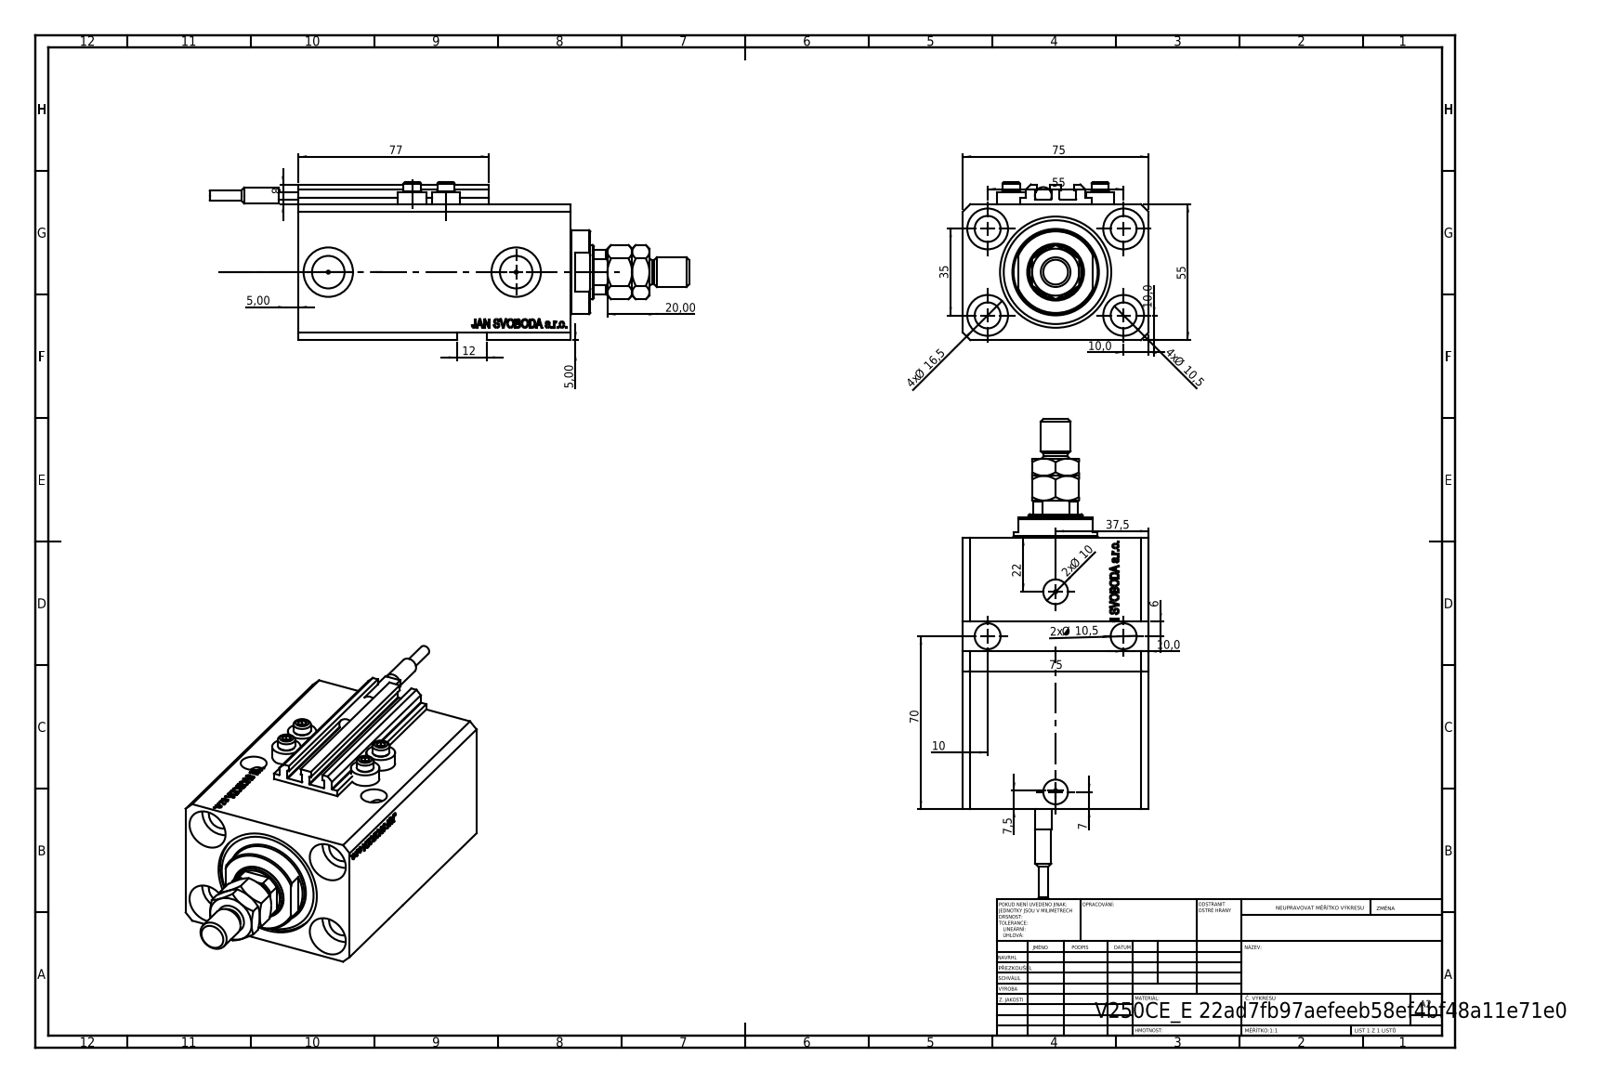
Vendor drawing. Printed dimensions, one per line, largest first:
77
75
75
70
55
55
37,5
35
22
20,00
4x Ø 16,5
12
4x Ø 10,5
2x Ø 10,5
10,0
10,0
2x Ø 10
10,0
10
8
7,5
7
6
5,00
5,00
